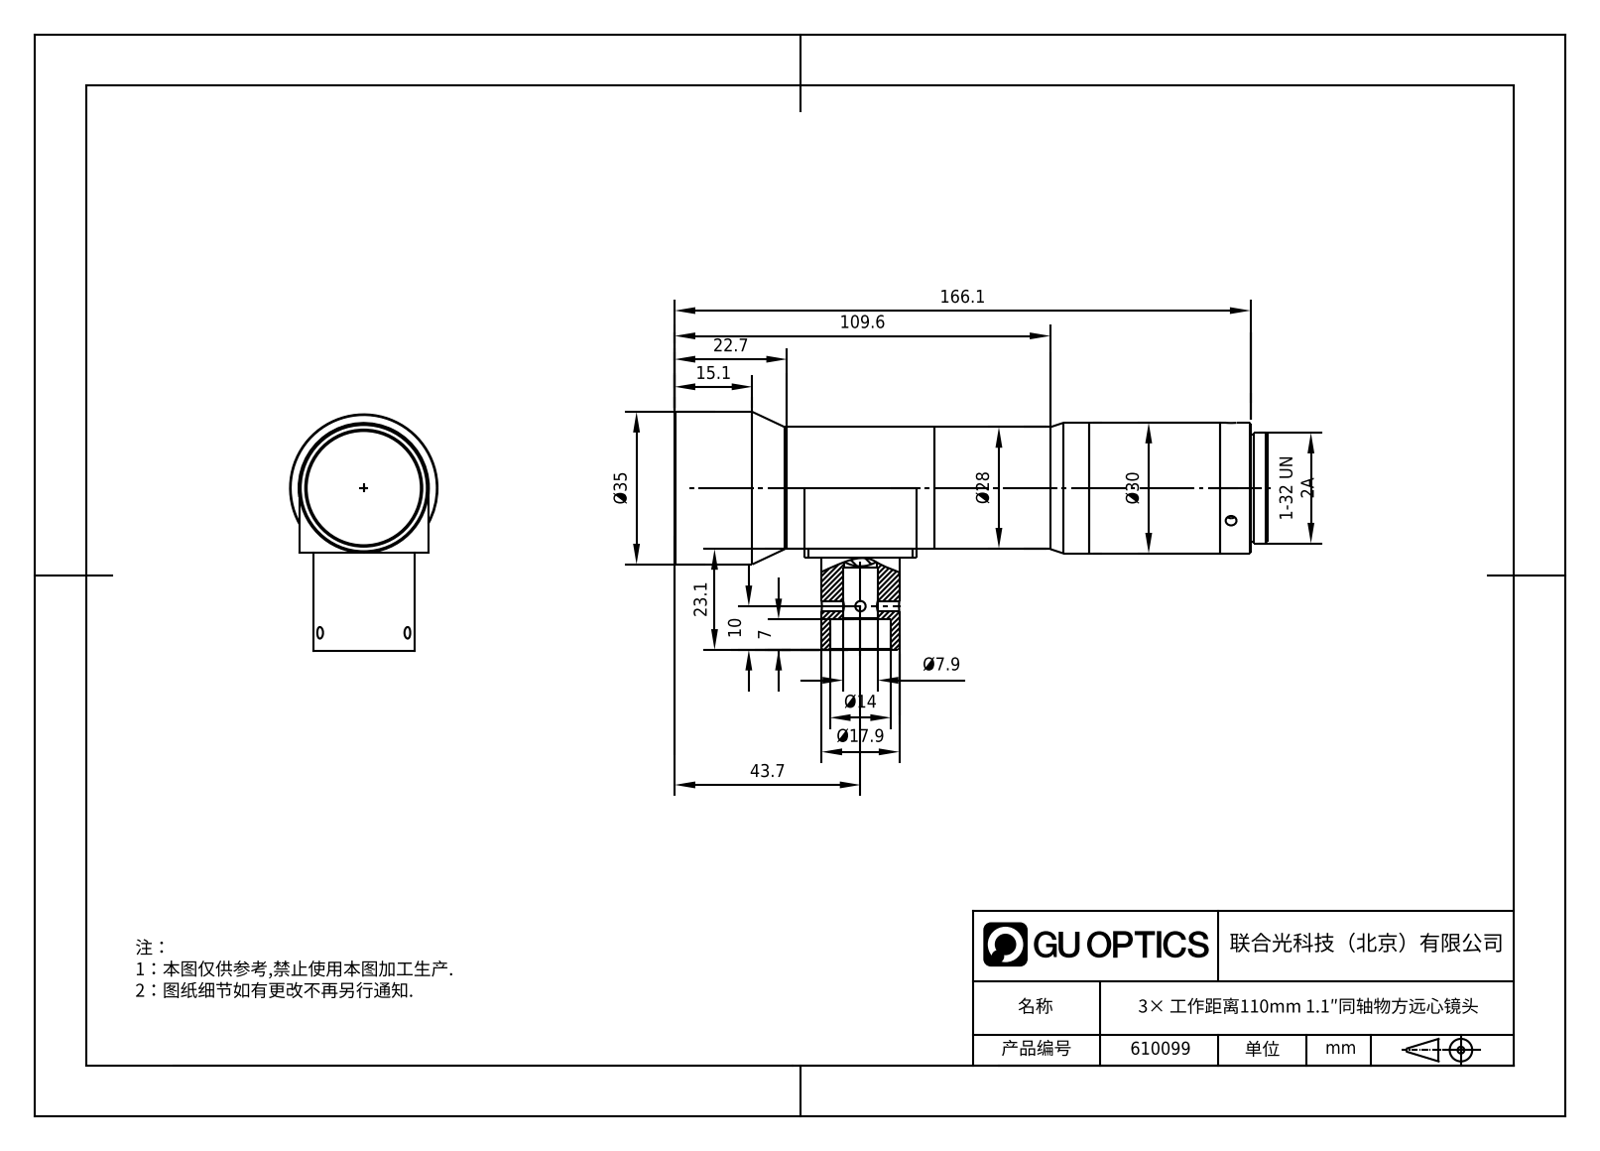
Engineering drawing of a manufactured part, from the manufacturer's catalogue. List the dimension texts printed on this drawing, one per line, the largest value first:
166.1
109.6
43.7
Ø35
Ø30
Ø28
23.1
22.7
Ø17.9
15.1
Ø14
10
Ø7.9
7
1-32 UN 2A
